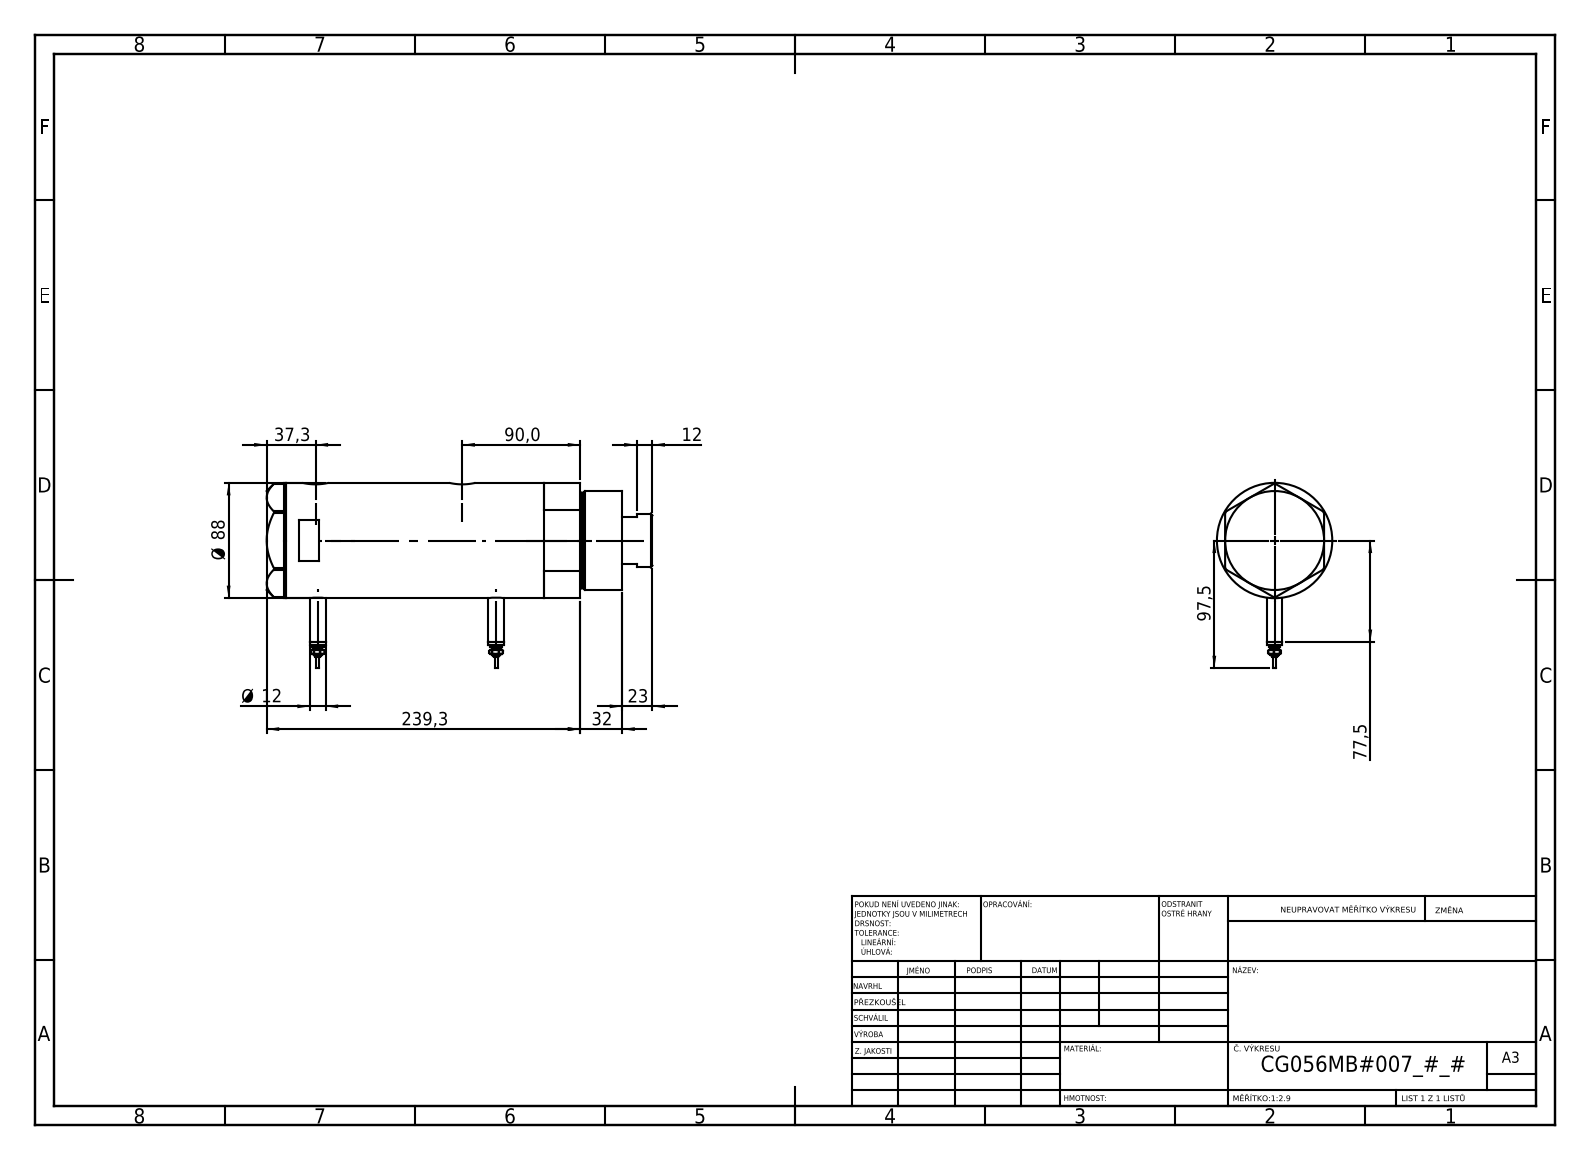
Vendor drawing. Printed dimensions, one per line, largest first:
239,3
97,5
90,0
Ø 88
77,5
37,3
32
23
12
Ø 12
